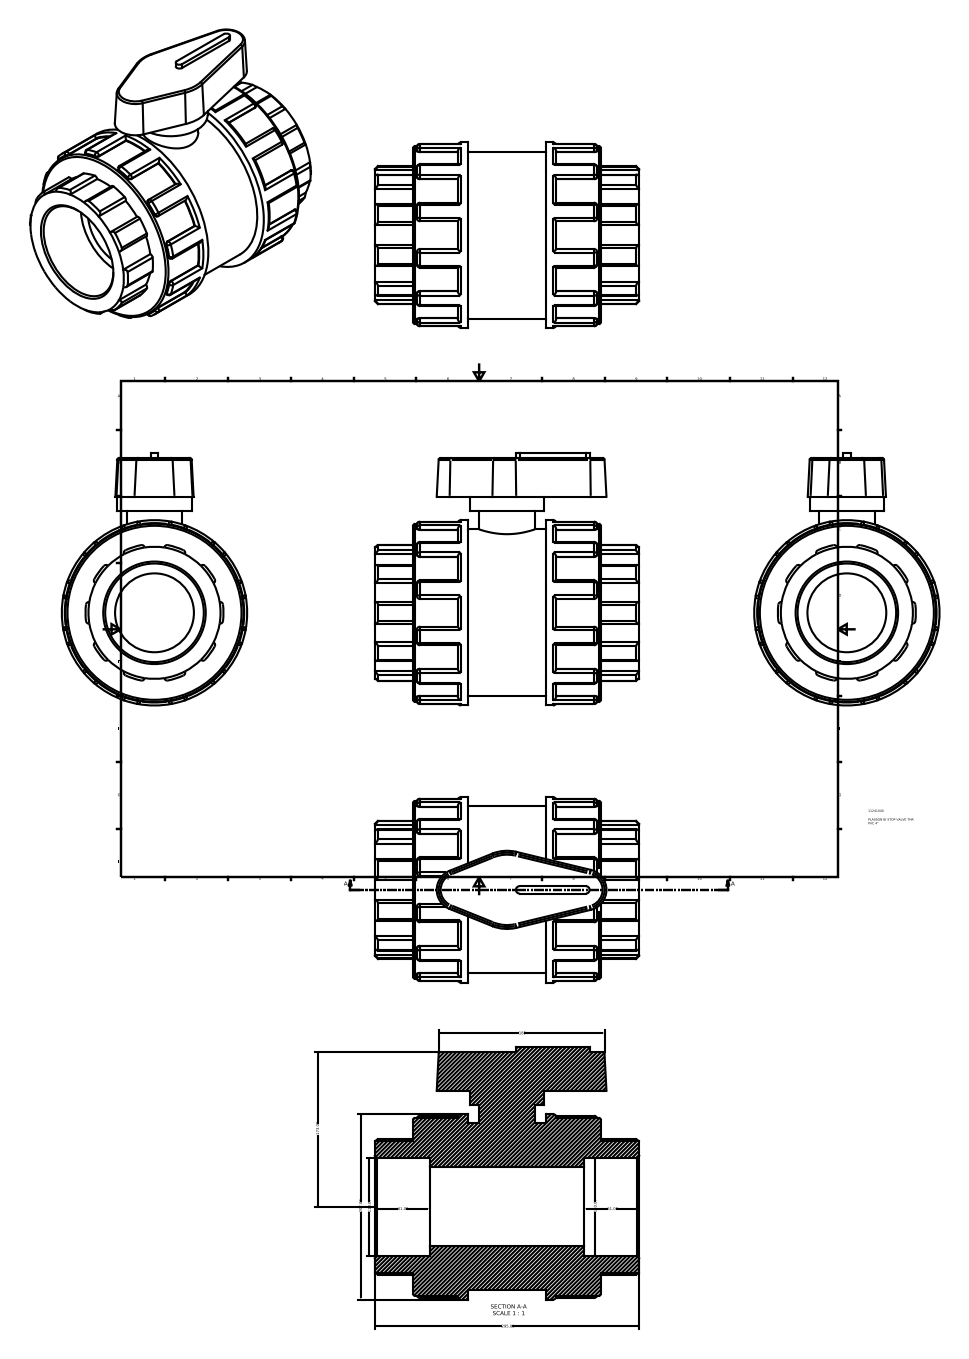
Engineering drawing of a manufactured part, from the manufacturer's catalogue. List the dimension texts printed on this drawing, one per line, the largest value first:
295.00
207.00
185
173.00
110.07
110.07
61.00
61.00
